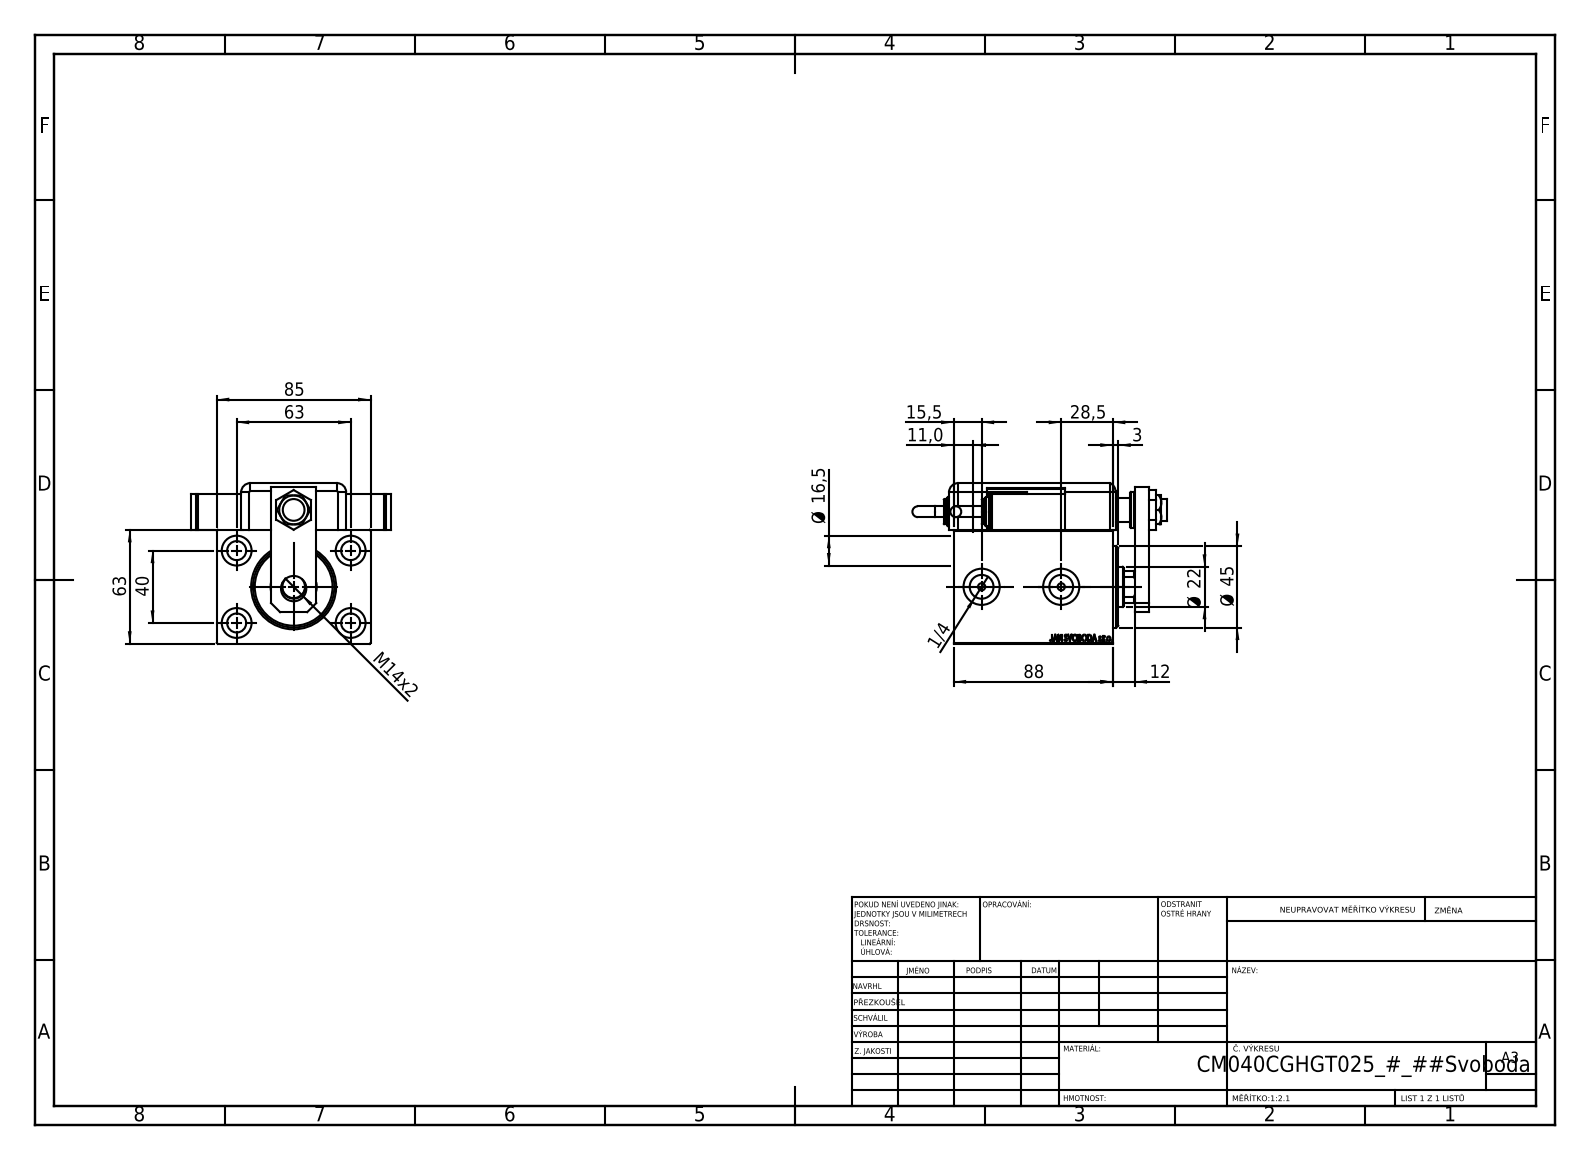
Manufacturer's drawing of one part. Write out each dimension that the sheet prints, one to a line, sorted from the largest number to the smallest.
88
85
63
63
Ø 45
40
28,5
Ø 22
Ø 16,5
15,5
M14x2
12
11,0
3
1/4
